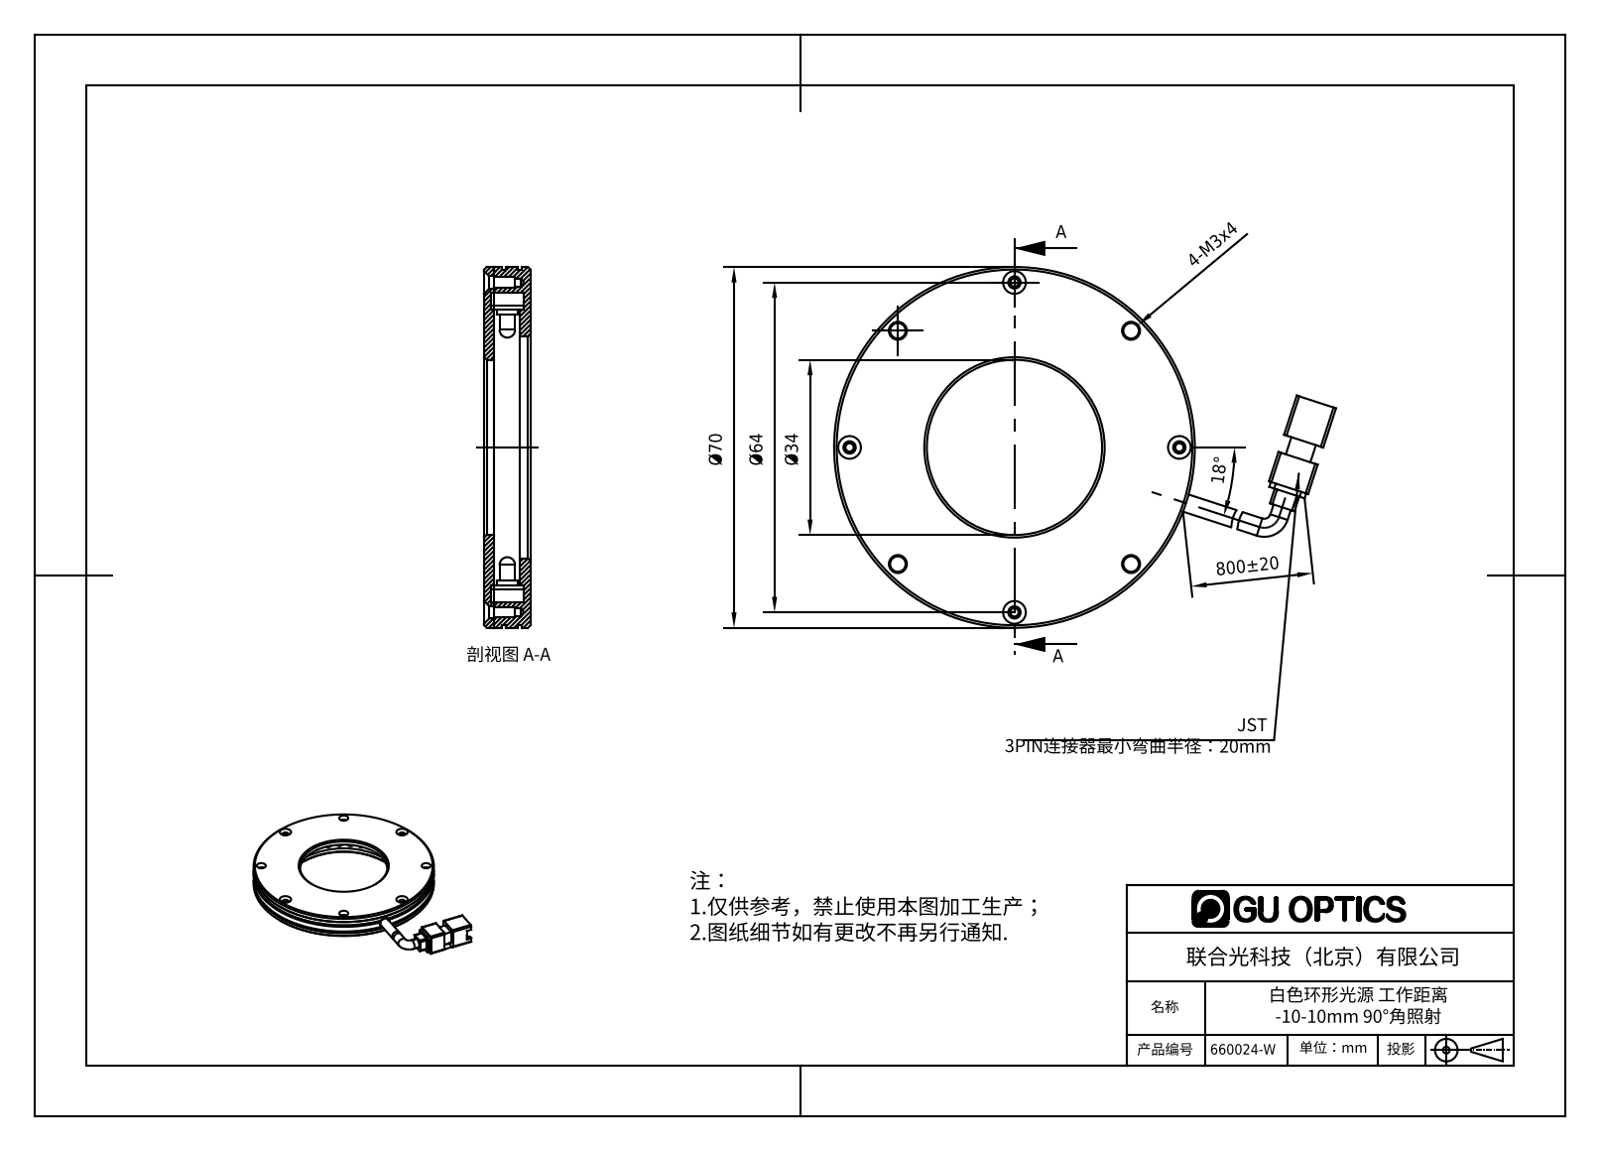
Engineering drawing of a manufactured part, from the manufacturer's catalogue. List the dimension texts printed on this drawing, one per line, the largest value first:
800±20
Ø70
Ø64
Ø34
18°
4-M3x4
